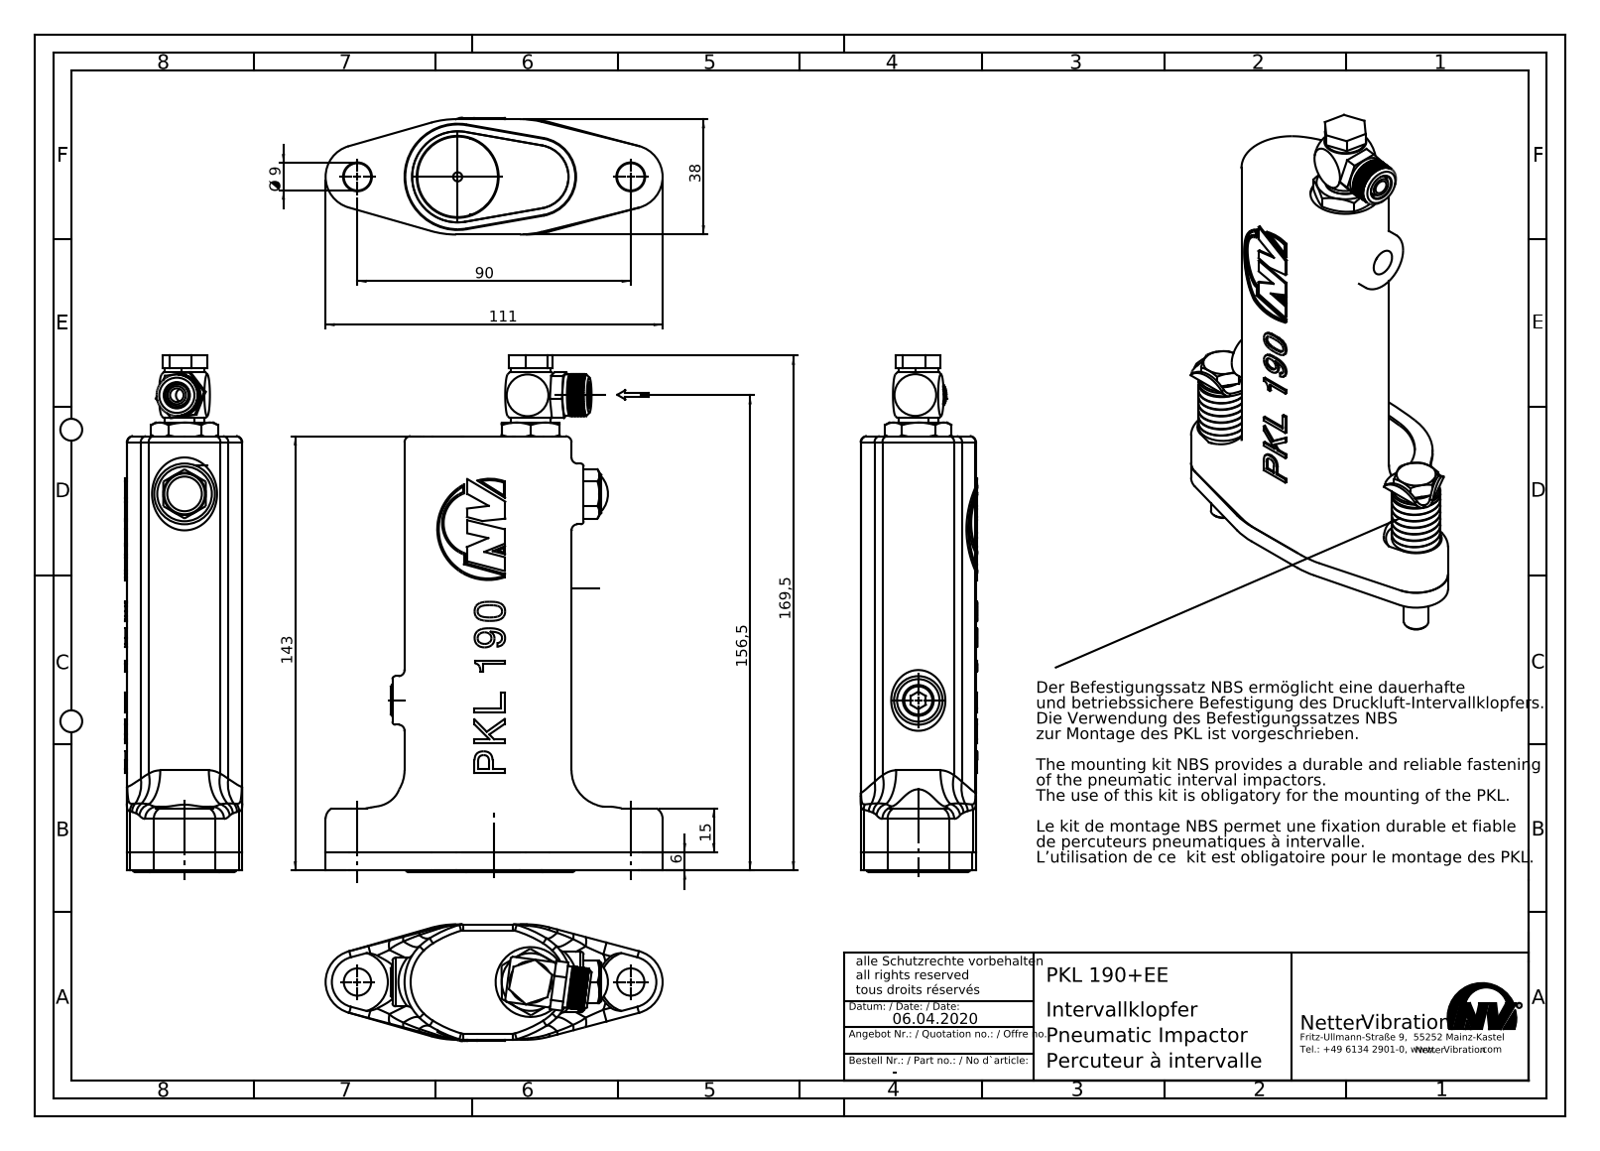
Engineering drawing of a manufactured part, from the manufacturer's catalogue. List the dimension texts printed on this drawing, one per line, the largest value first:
169,5
156,5
143
111
90
38
15
Ø 9
6
